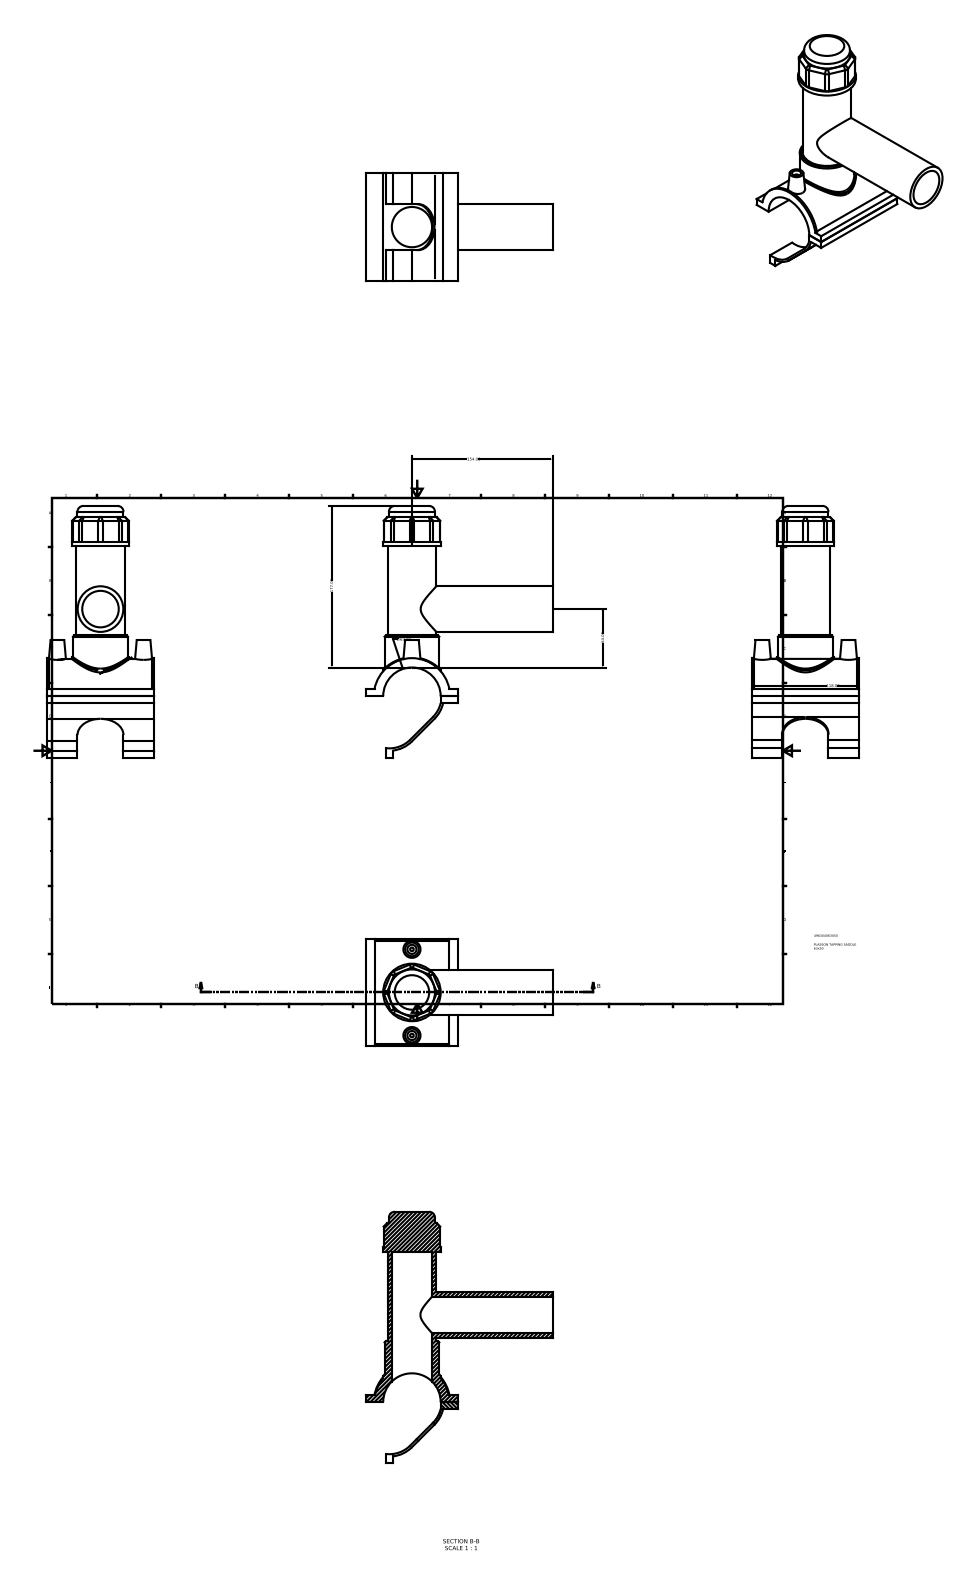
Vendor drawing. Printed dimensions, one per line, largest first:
177.00
154.00
118.00
64.00
∅63.00
